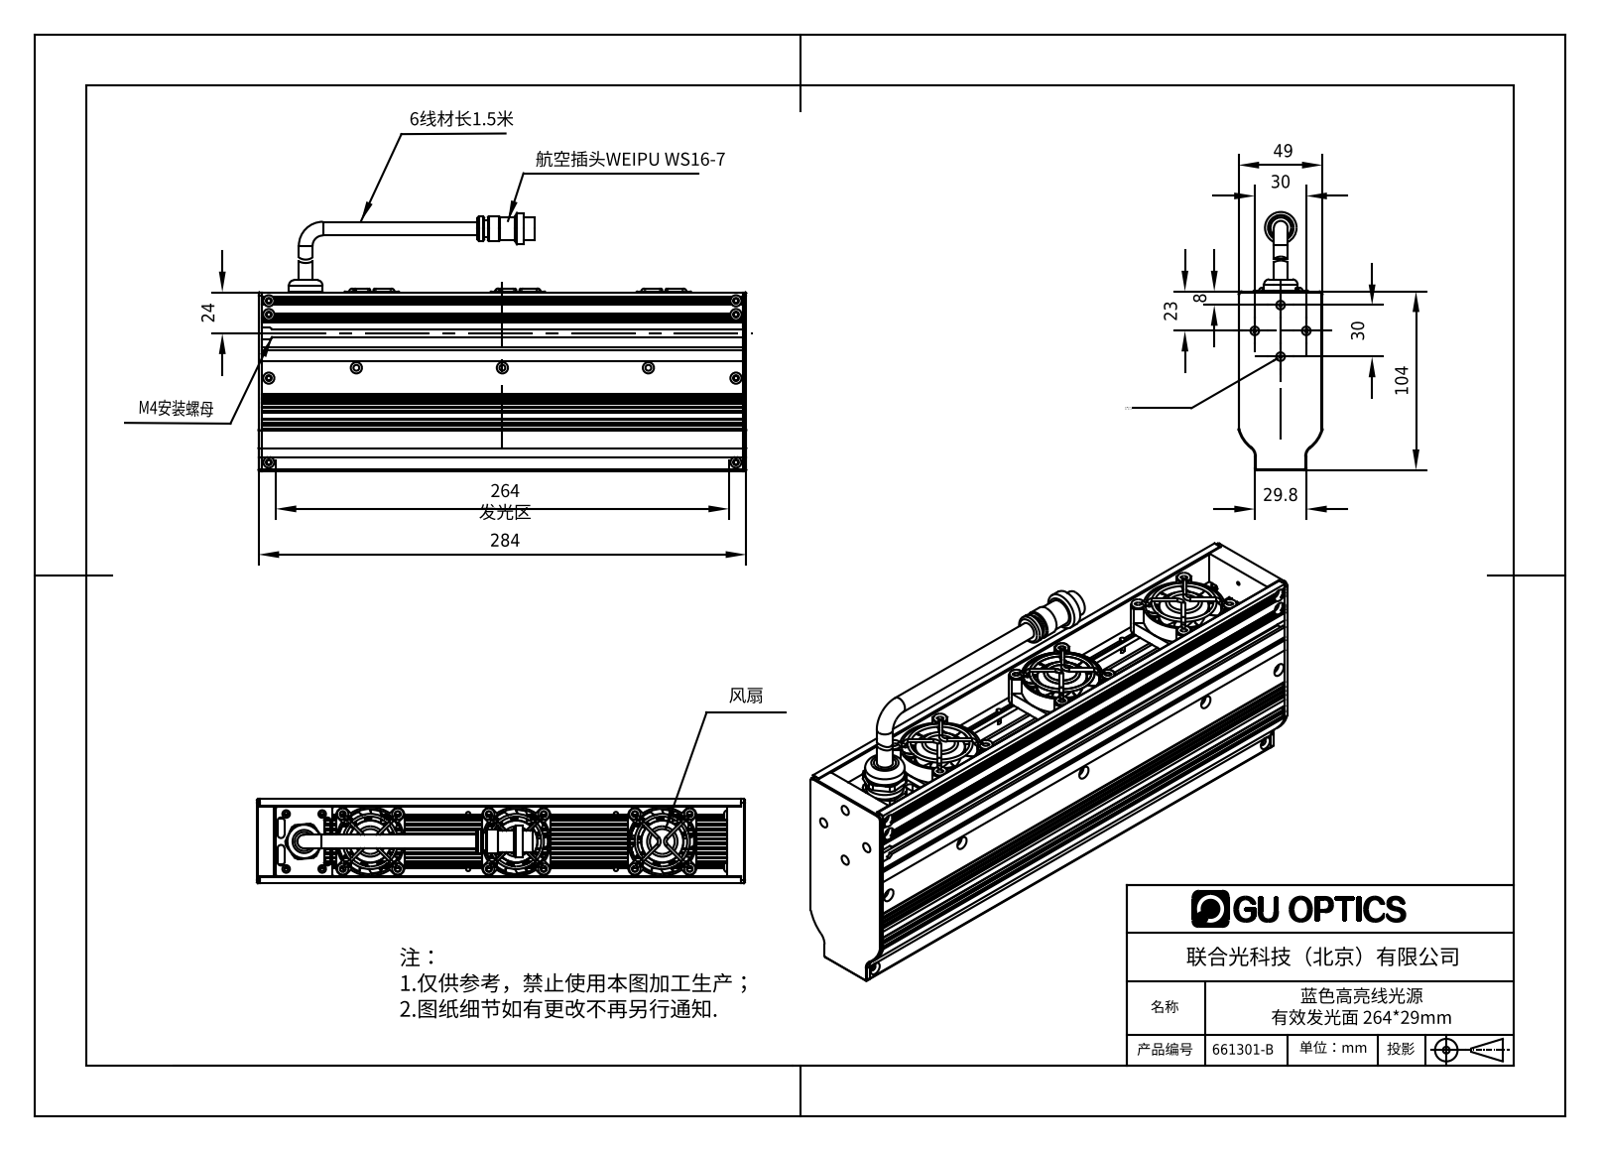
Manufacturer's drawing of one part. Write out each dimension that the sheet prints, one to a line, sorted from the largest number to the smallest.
284
264 发光区
104
49
30
30
29.8
24
23
8
8 x ∅2 x 9 M6 - 6H x 6
